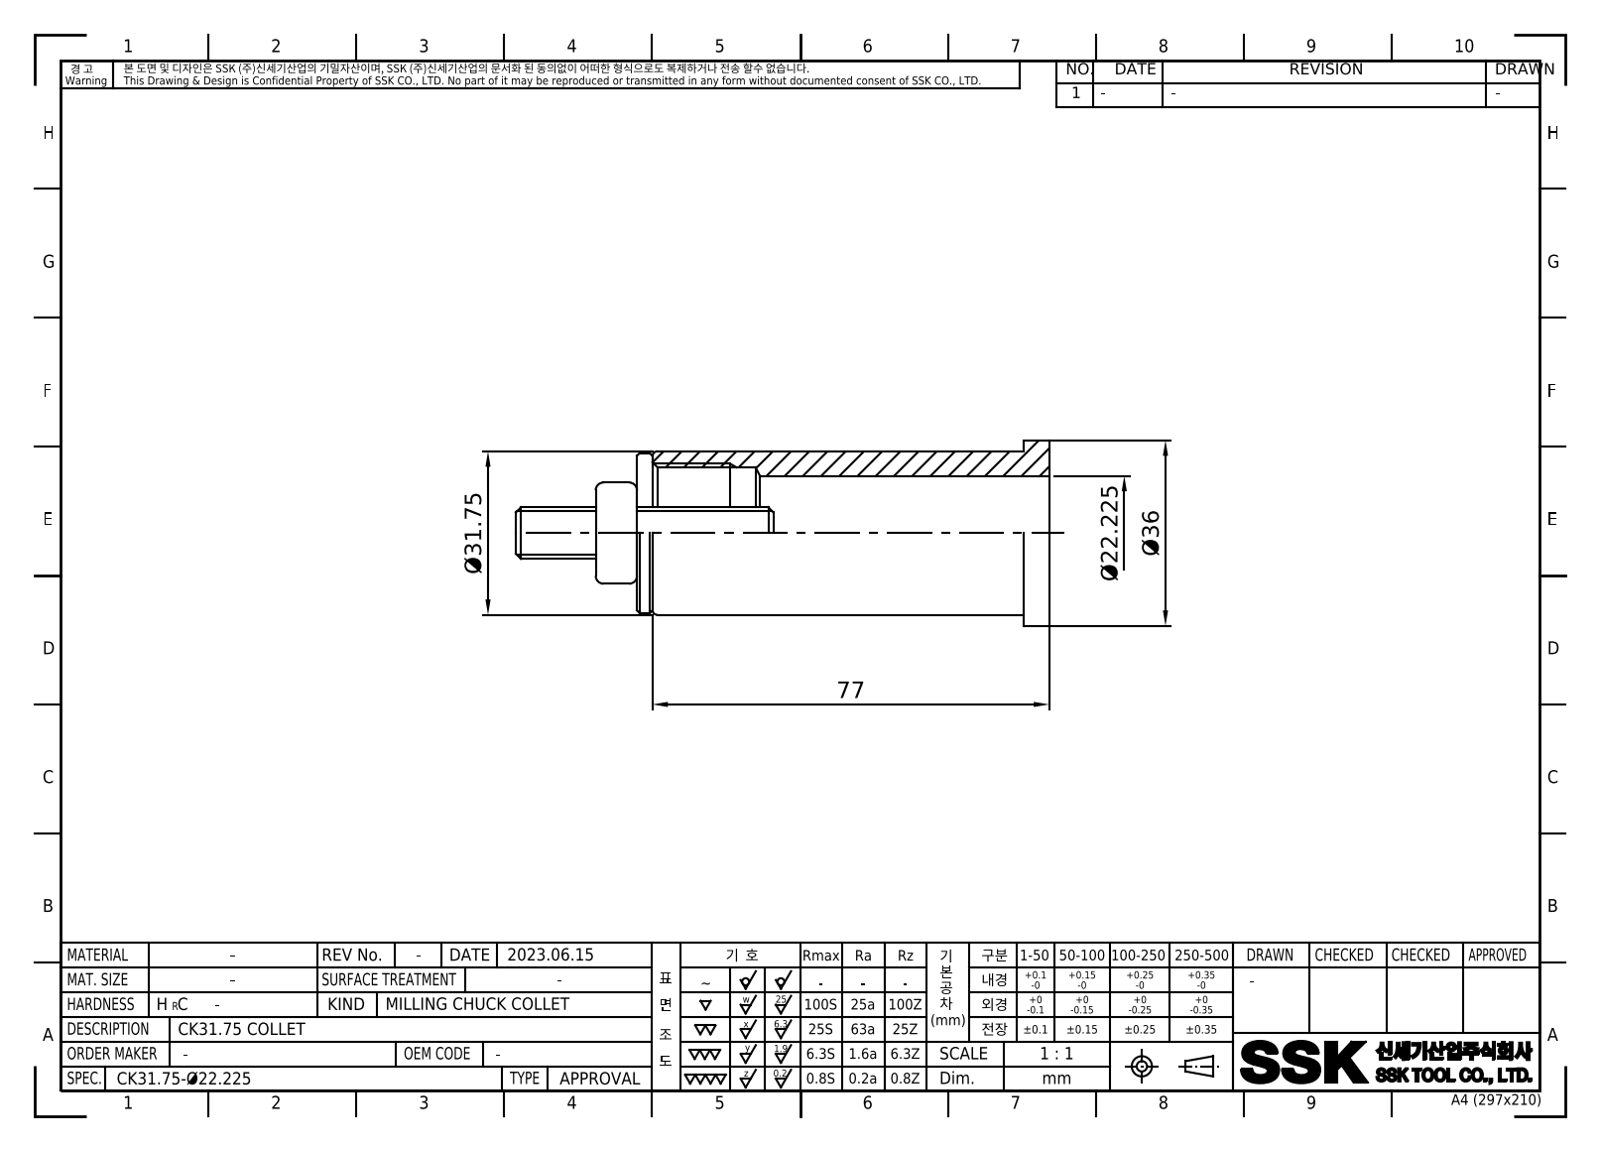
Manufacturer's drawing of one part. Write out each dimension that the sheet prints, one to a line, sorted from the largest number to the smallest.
77
Ø36
Ø31.75
Ø22.225
